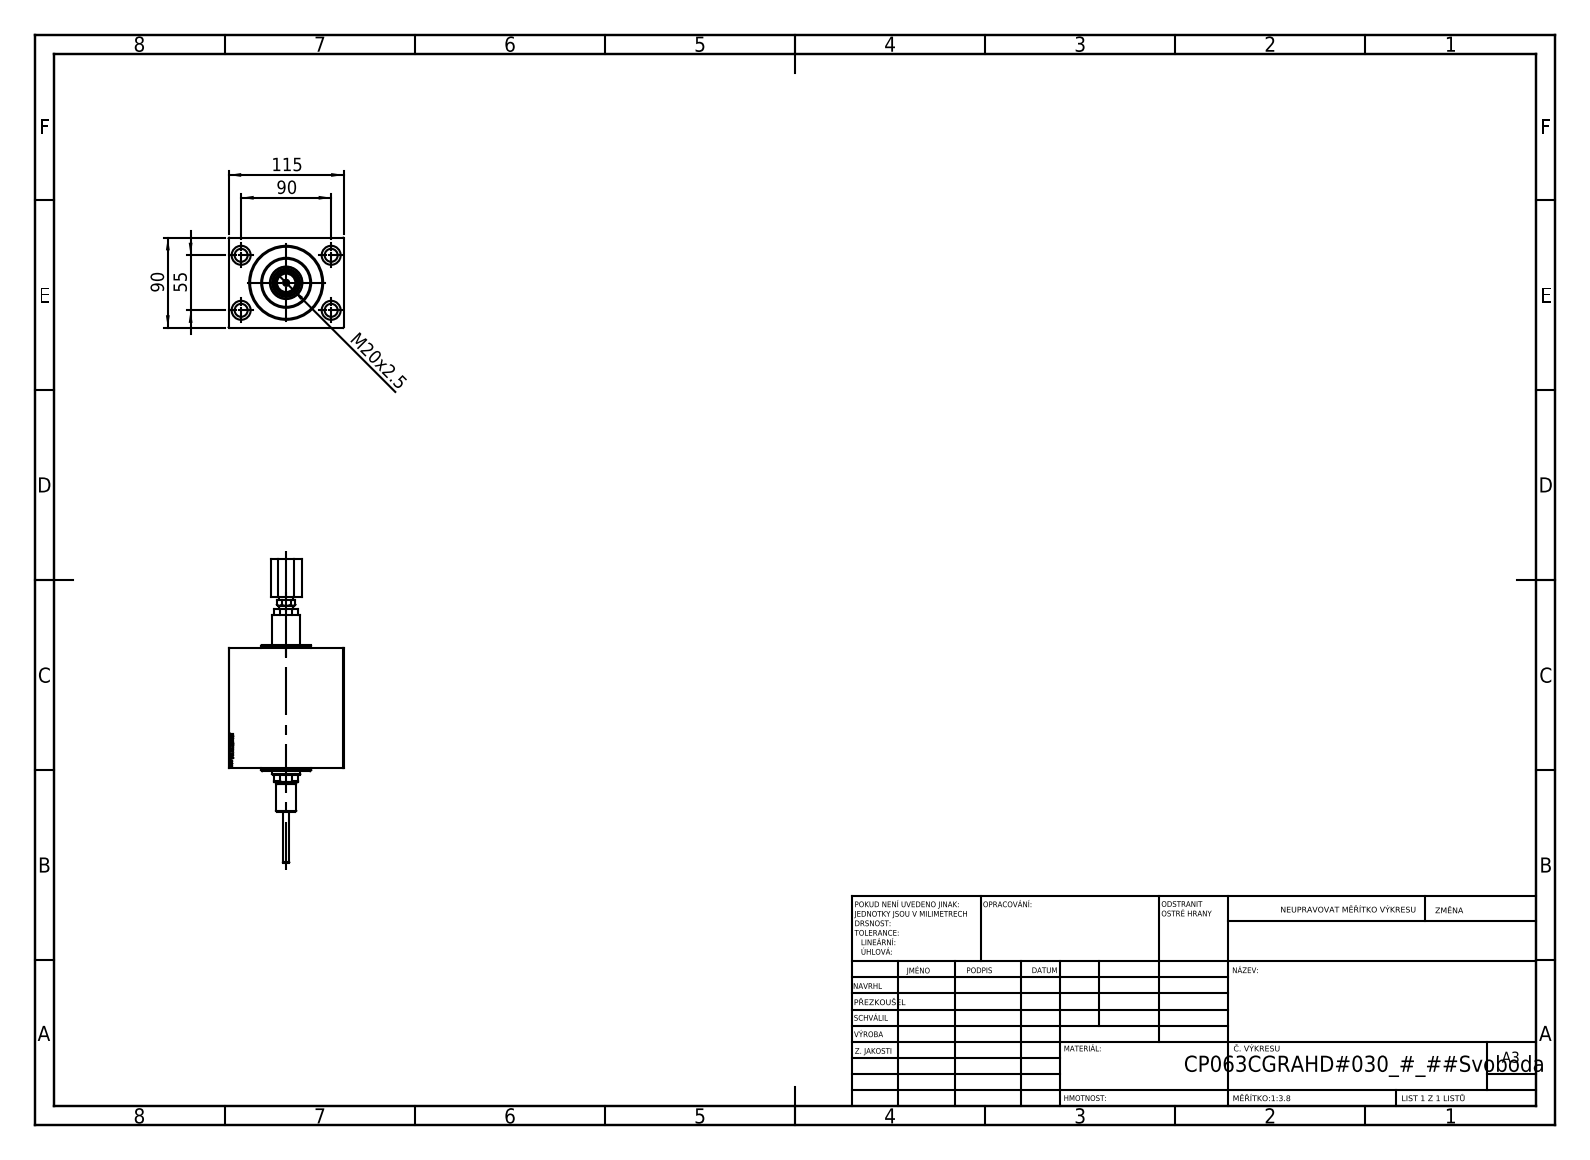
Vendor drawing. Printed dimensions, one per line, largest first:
115
90
90
55
M20x2.5
